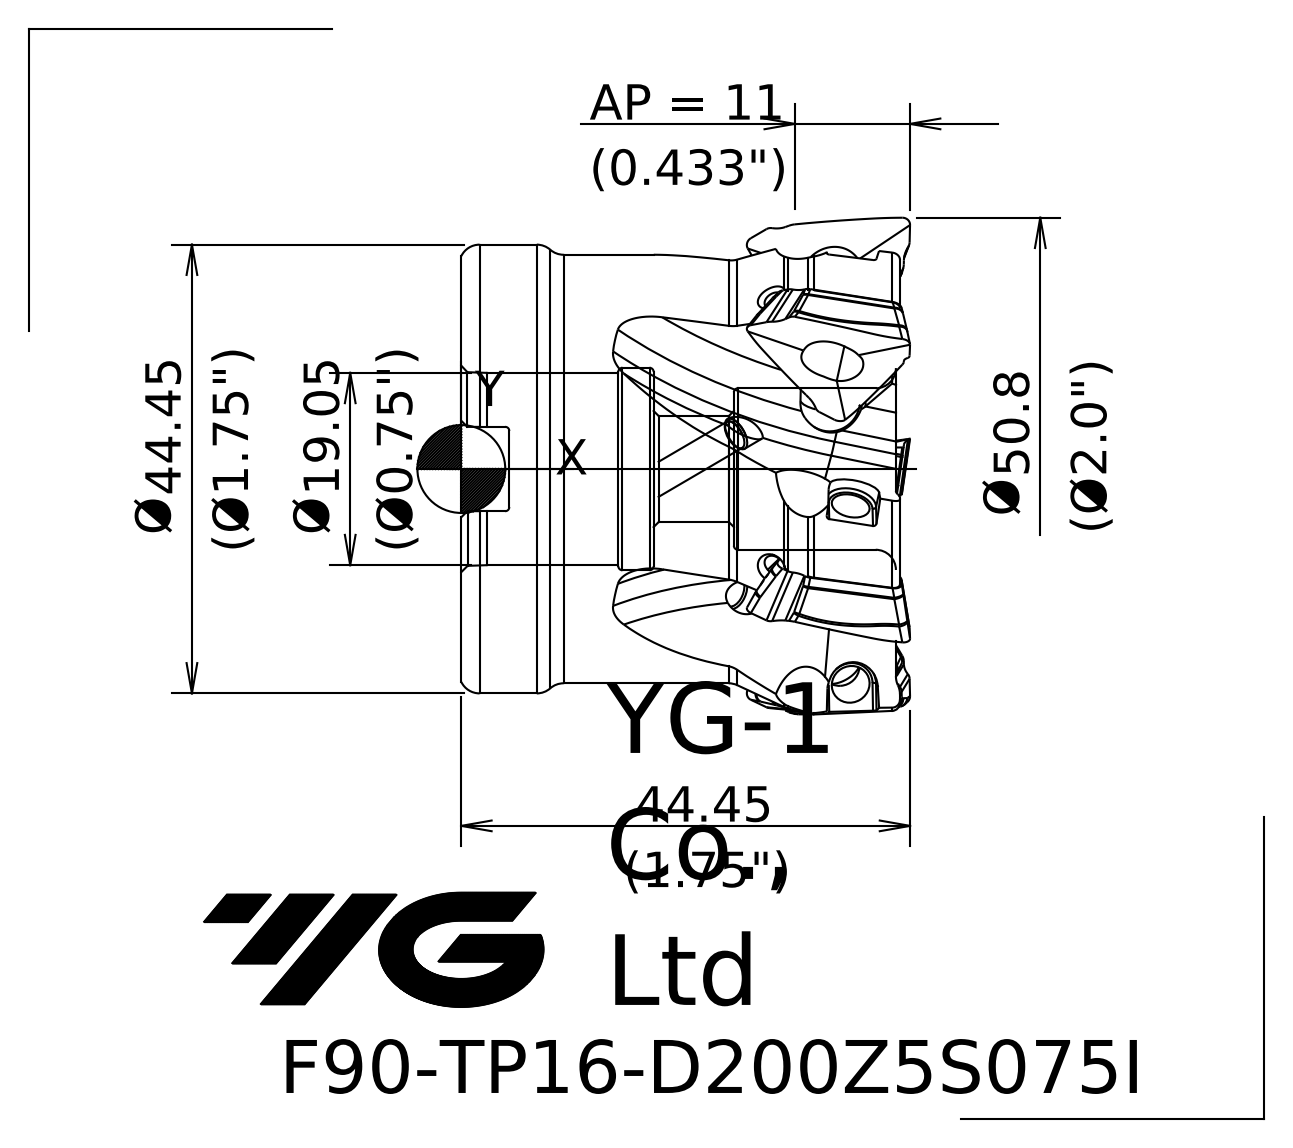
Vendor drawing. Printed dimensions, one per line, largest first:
50.8 Ø
44.45
19.05 Ø
AP = 11
